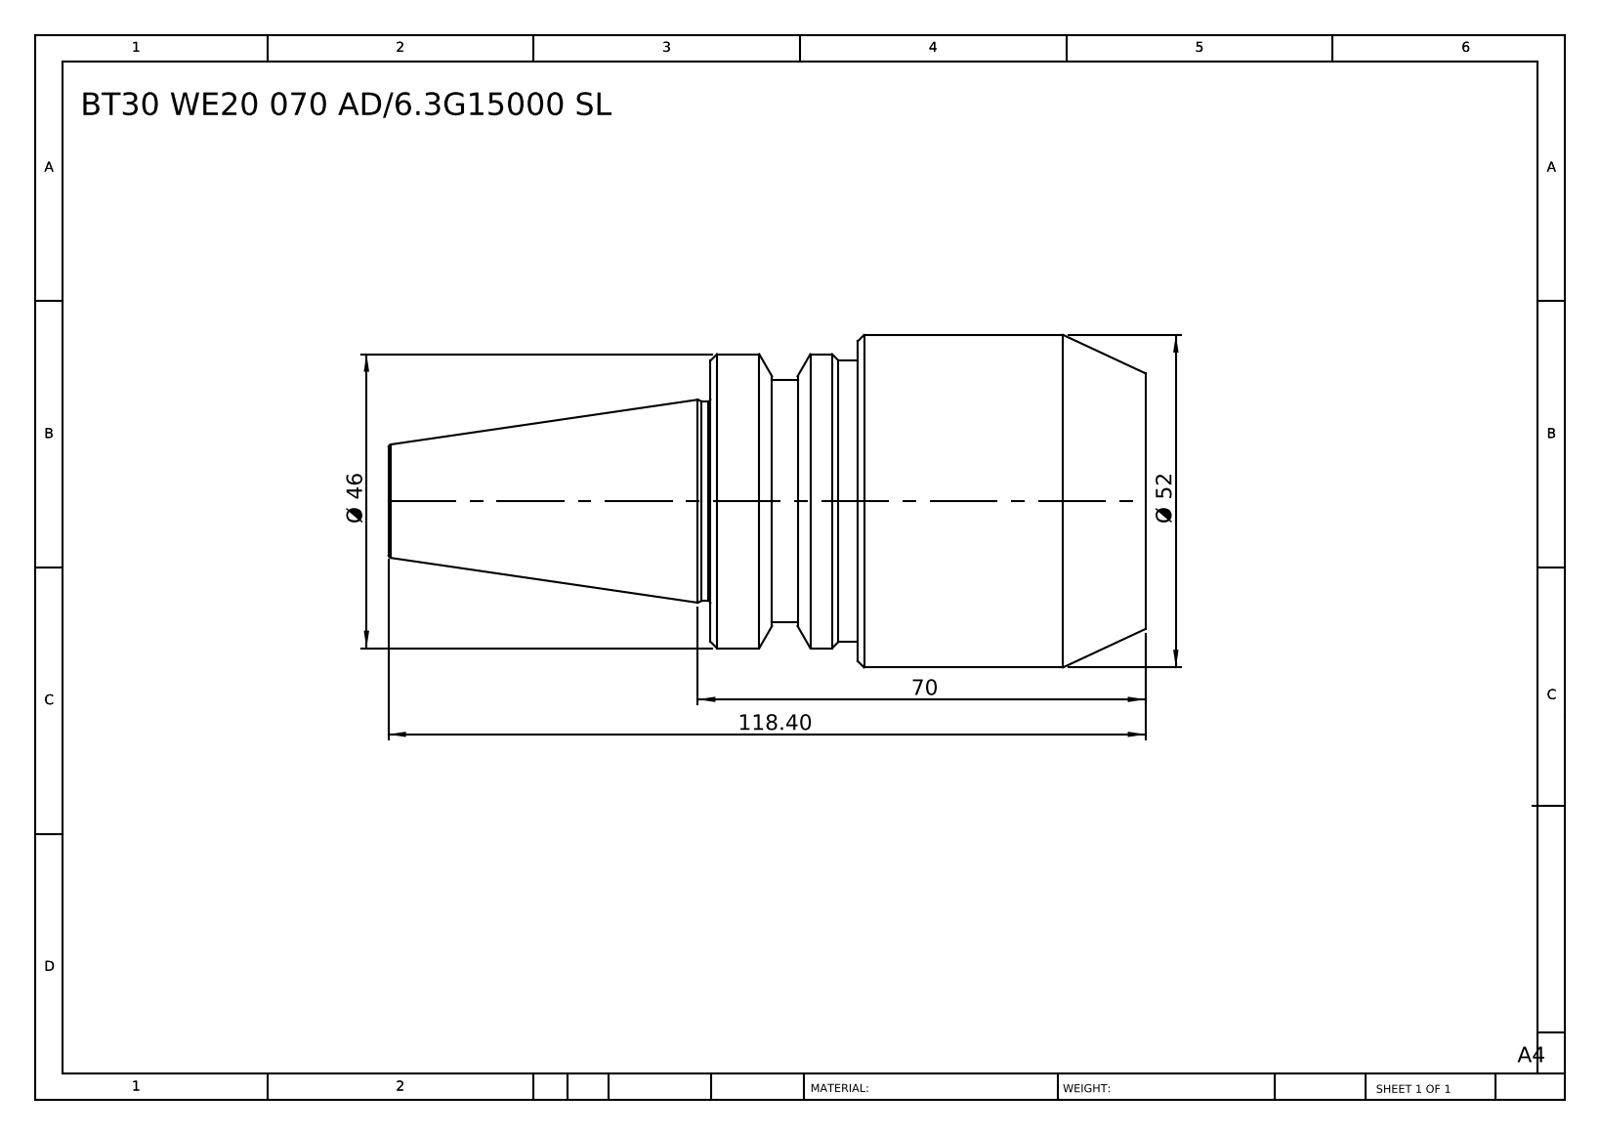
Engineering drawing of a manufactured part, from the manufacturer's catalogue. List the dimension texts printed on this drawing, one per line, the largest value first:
118.40
70
Ø 52
Ø 46
